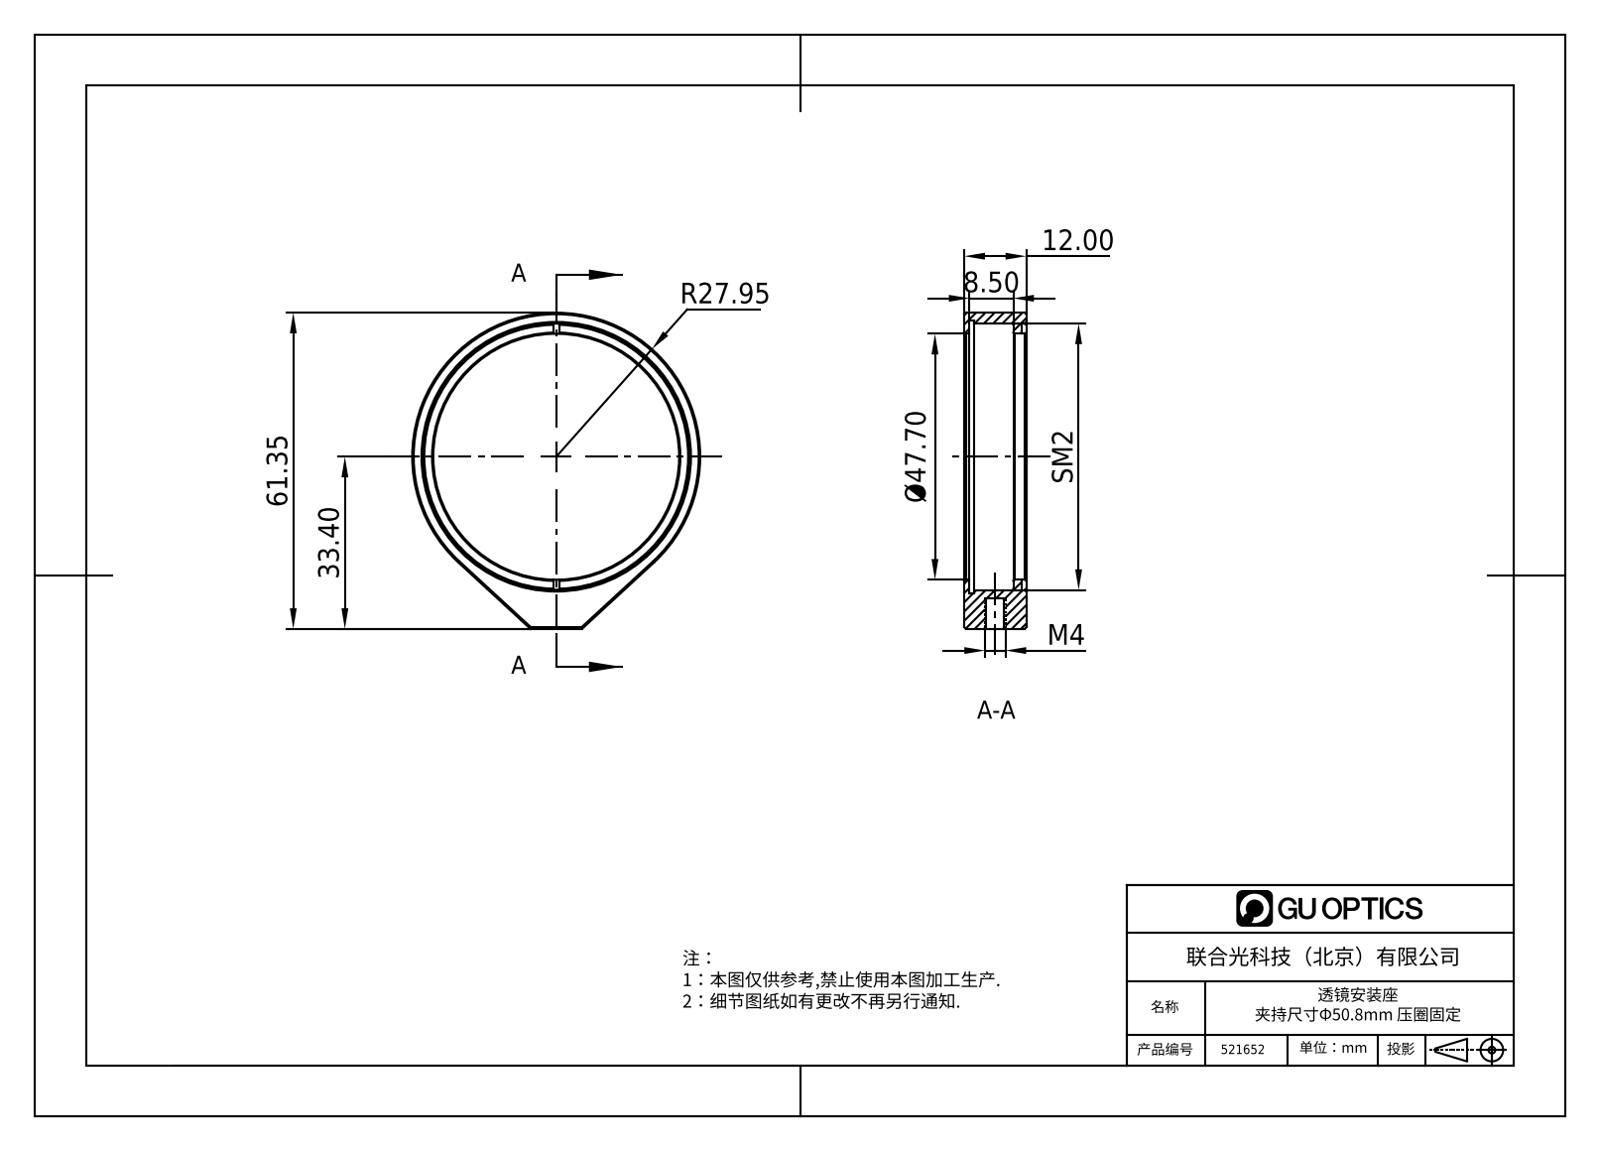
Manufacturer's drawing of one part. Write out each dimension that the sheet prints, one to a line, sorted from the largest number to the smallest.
61.35
Ø47.70
33.40
R27.95
12.00
8.50
M4
SM2
